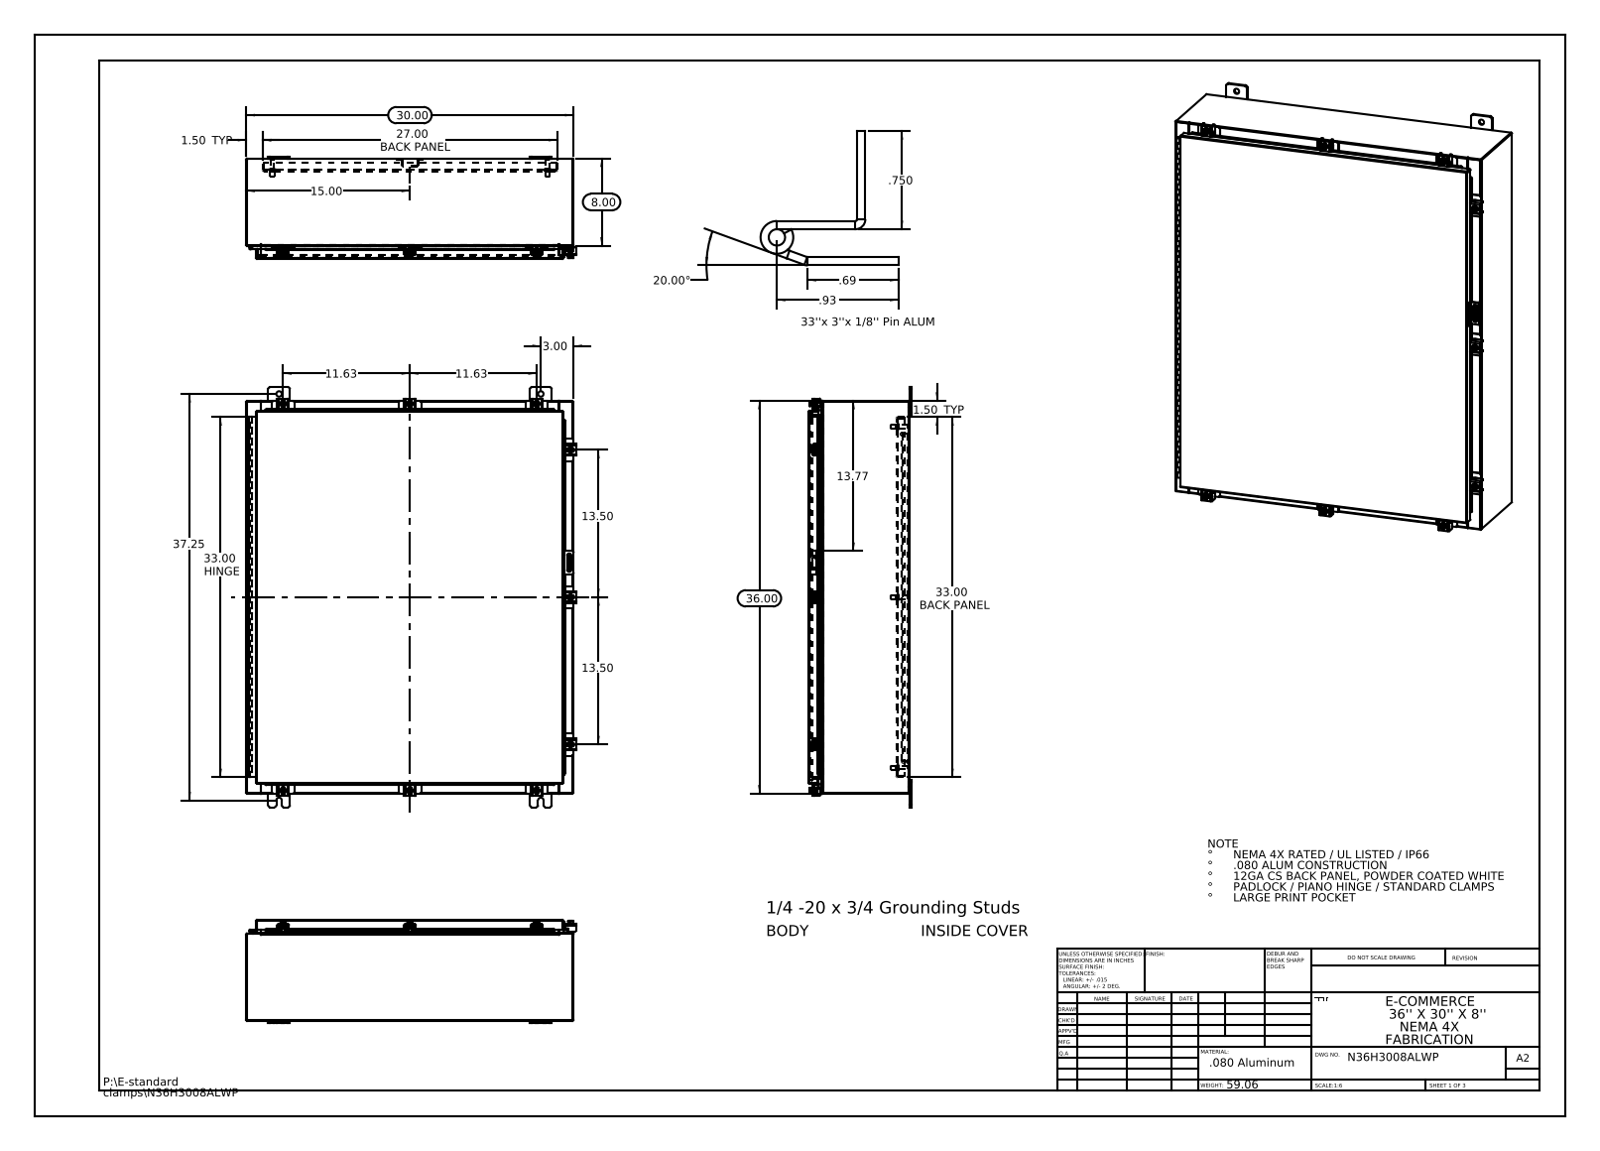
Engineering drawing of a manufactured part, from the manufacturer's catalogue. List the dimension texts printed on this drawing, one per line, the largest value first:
37.25
36.00
33.00 HINGE
33.00 BACK PANEL
30.00
27.00 BACK PANEL
20.00°
15.00
13.77
13.50
13.50
11.63
11.63
8.00
3.00
1.50 TYP
1.50 TYP
.93
.750
.69
